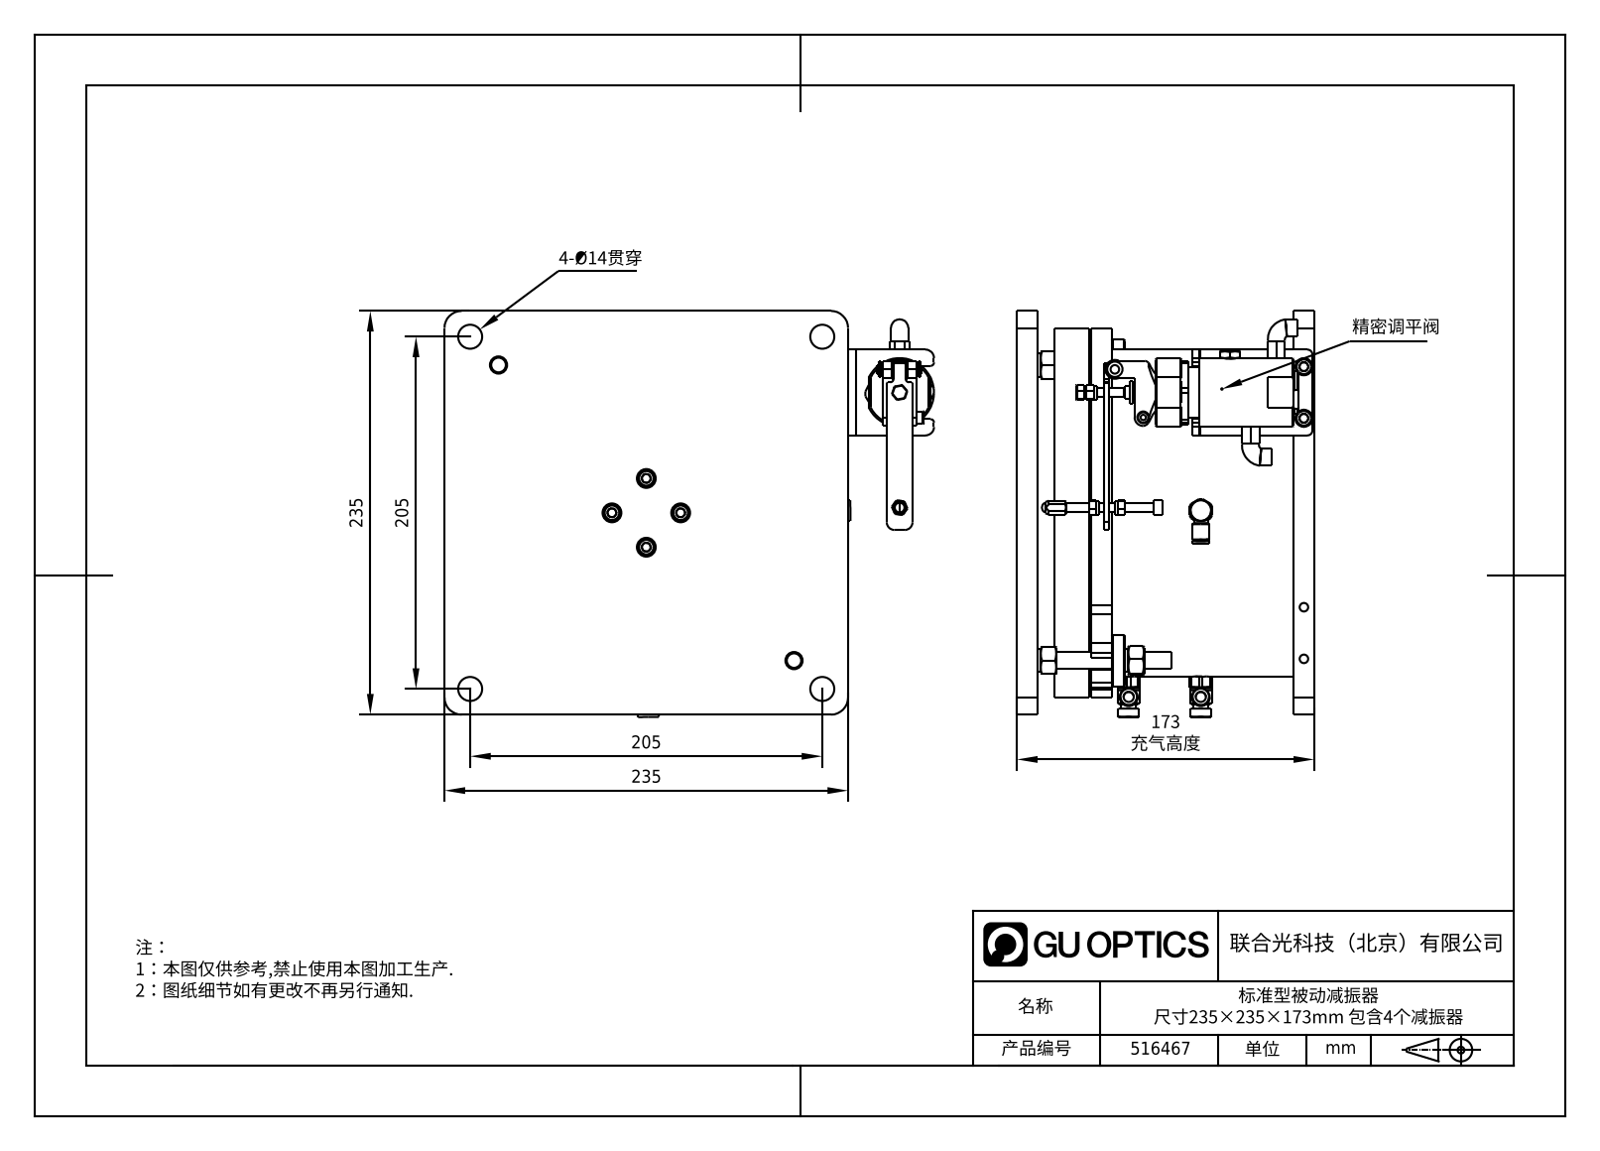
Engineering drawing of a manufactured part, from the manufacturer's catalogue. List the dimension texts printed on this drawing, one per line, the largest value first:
235
235
205
205
173 充气高度
